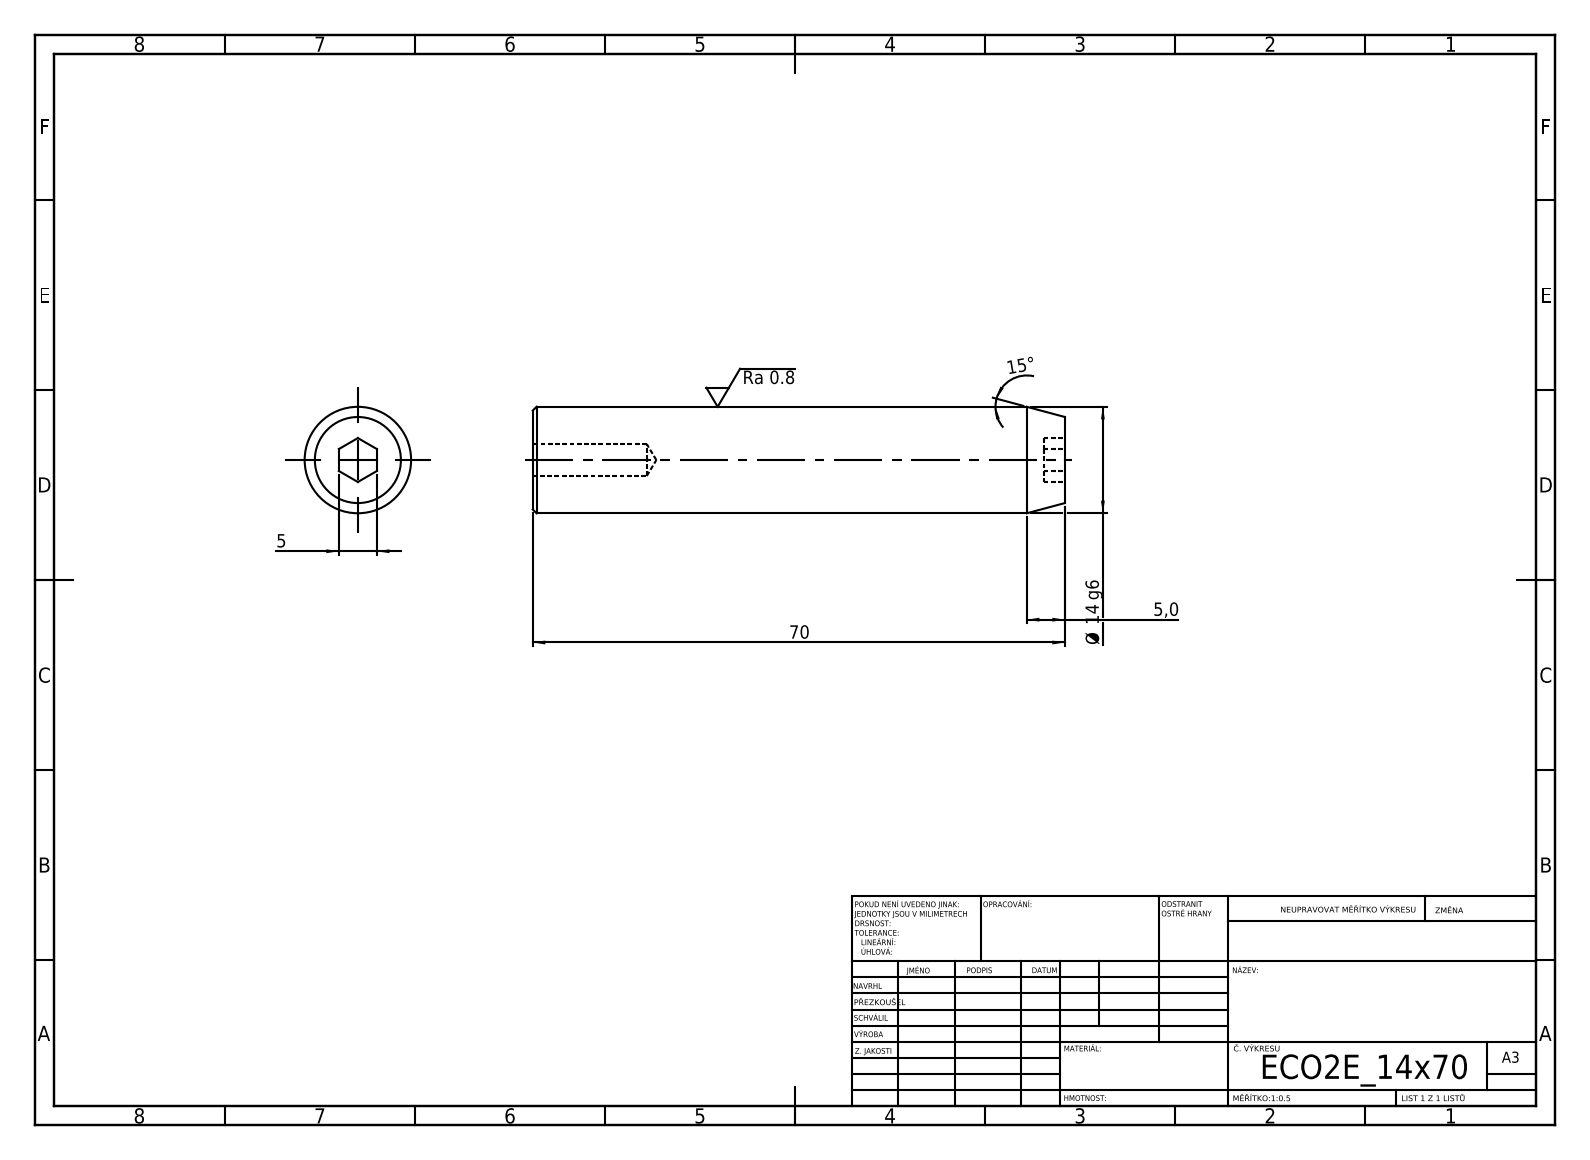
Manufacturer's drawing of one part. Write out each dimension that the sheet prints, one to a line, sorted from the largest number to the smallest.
70
15°
Ø 14 g6
5,0
5
